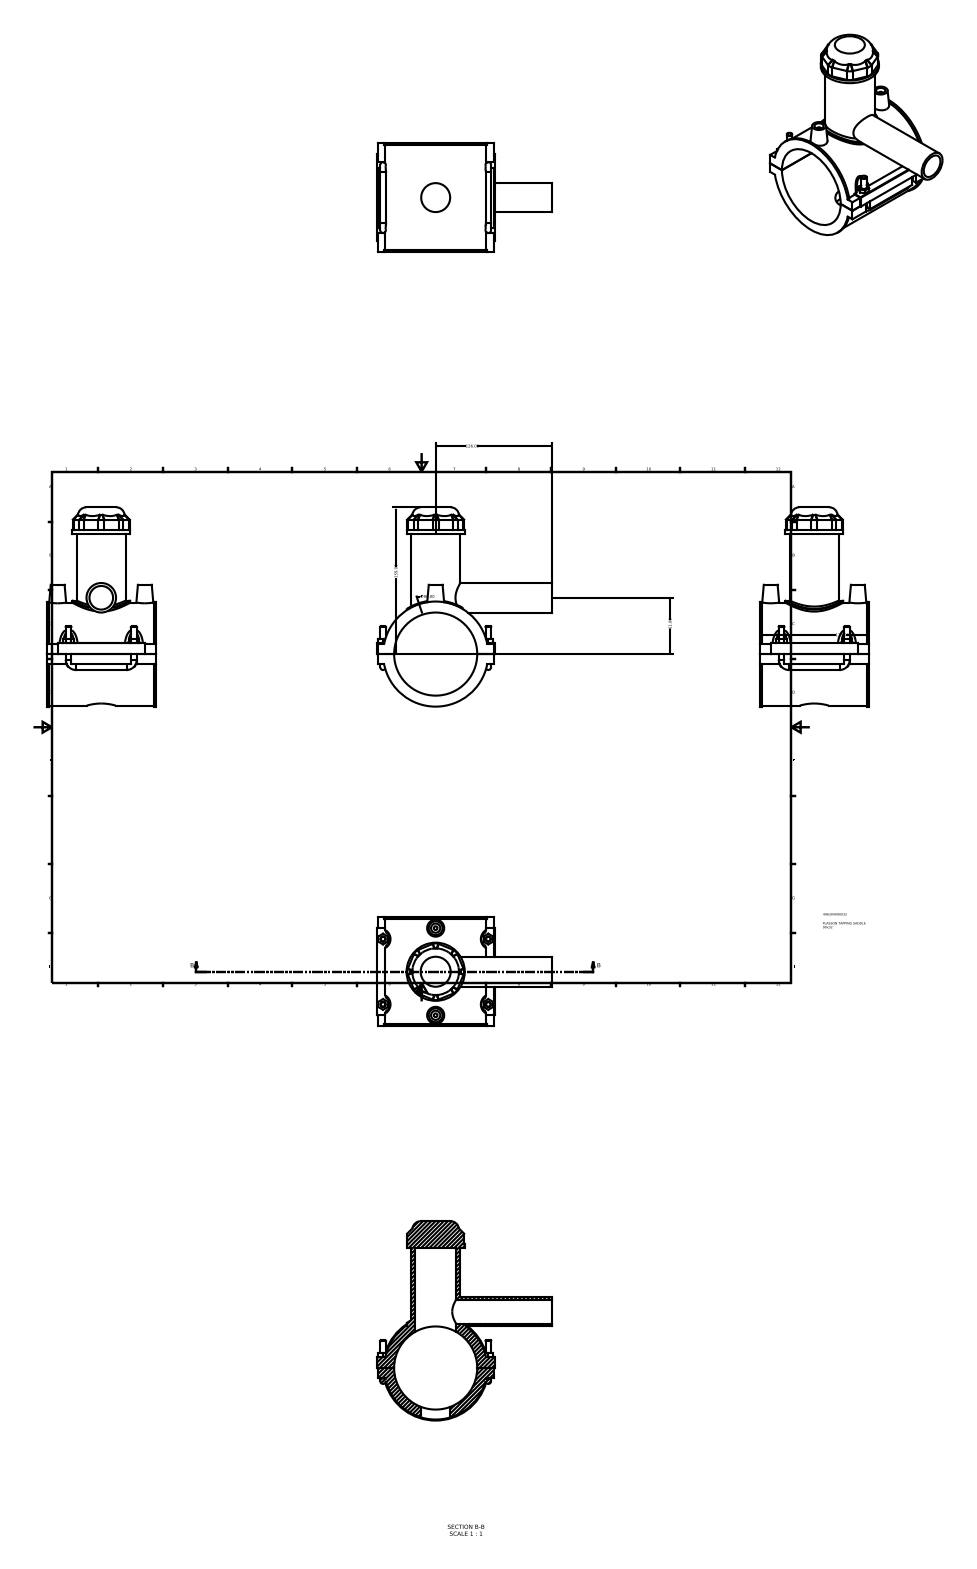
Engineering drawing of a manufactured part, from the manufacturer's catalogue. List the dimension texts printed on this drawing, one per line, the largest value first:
159.00
126.00
118.00
∅90.00
61.00
